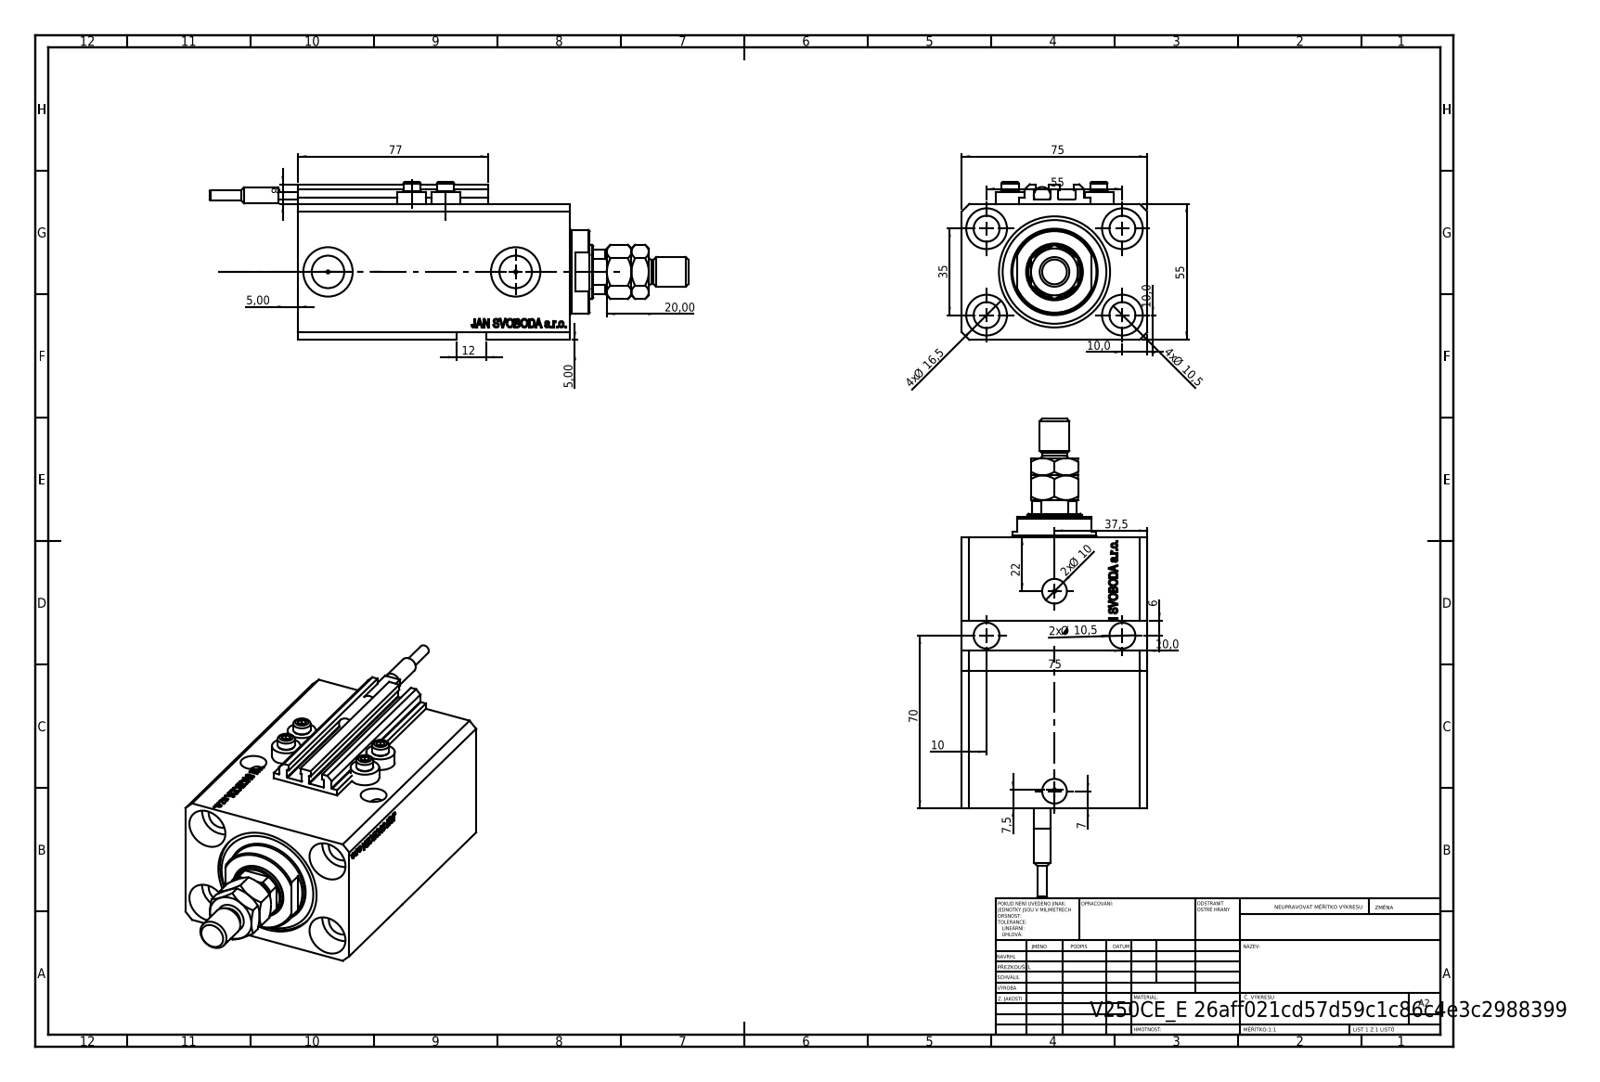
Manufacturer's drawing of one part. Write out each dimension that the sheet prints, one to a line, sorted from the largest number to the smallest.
77
75
75
70
55
55
37,5
35
22
20,00
4x Ø 16,5
12
4x Ø 10,5
2x Ø 10,5
10,0
10,0
2x Ø 10
10,0
10
8
7,5
7
6
5,00
5,00
